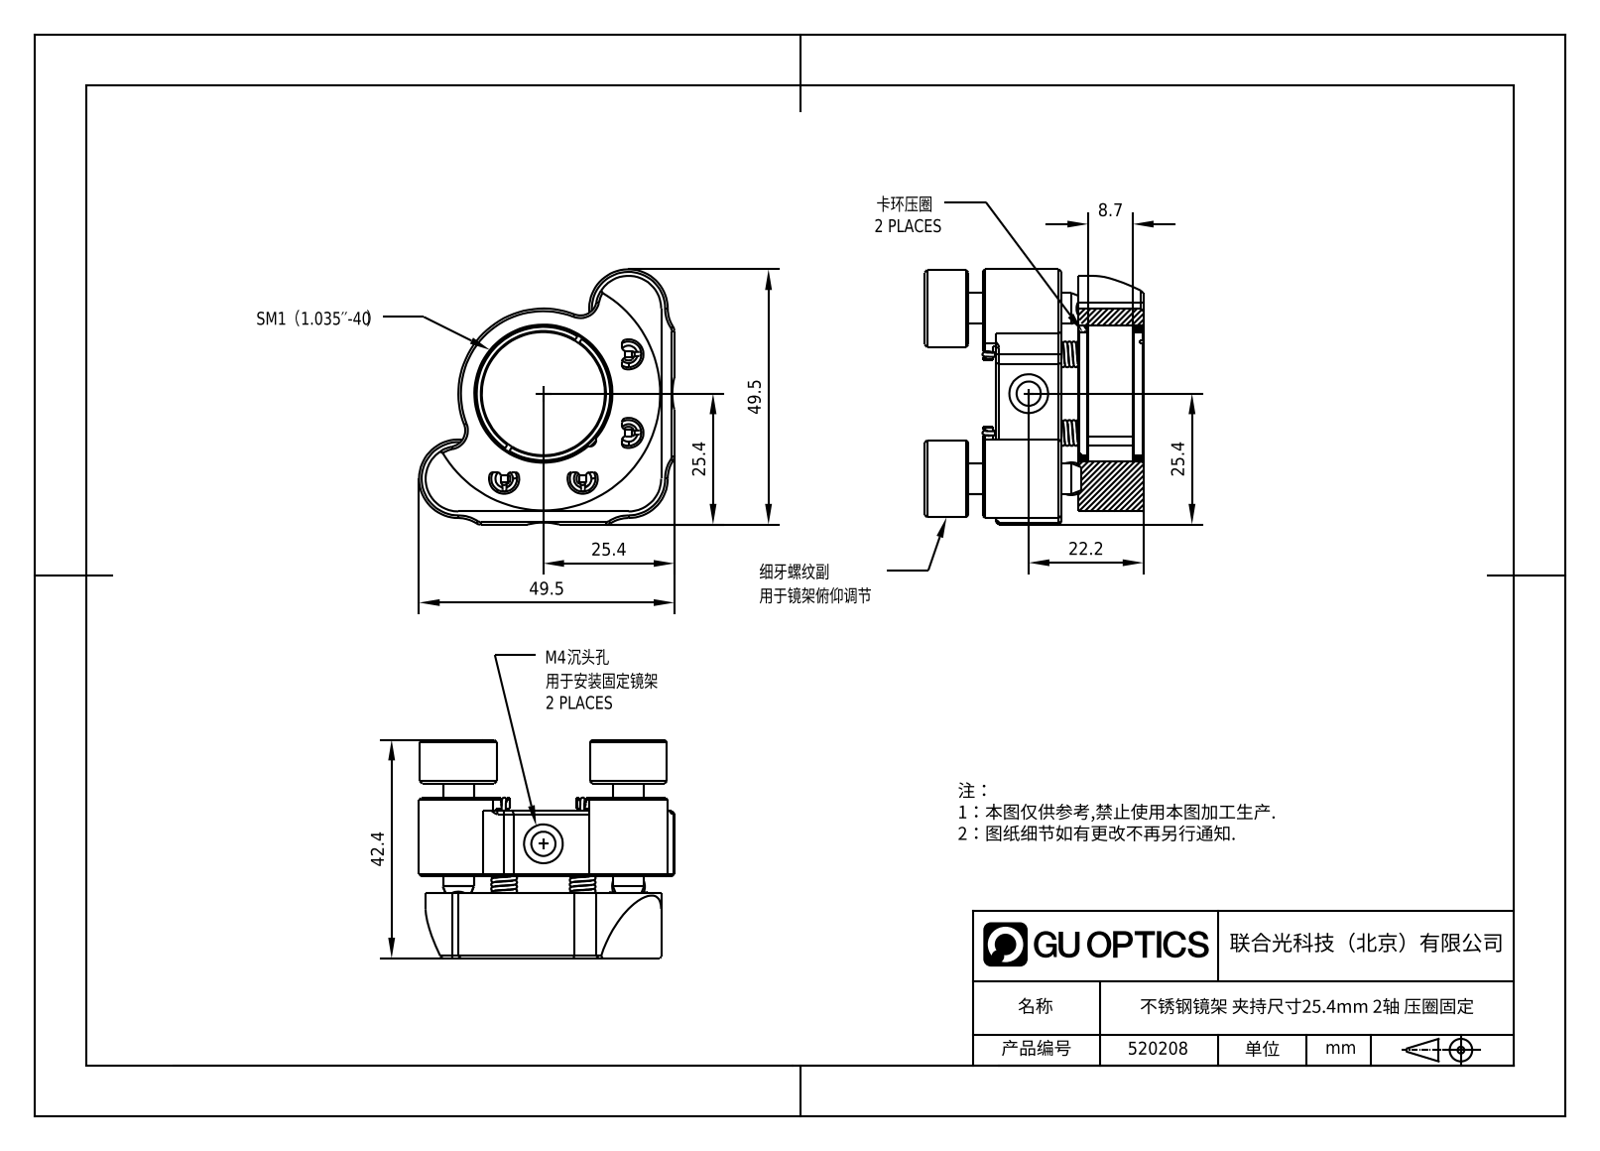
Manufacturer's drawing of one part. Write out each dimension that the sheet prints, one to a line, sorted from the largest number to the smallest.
49.5
49.5
42.4
25.4
25.4
25.4
22.2
8.7
